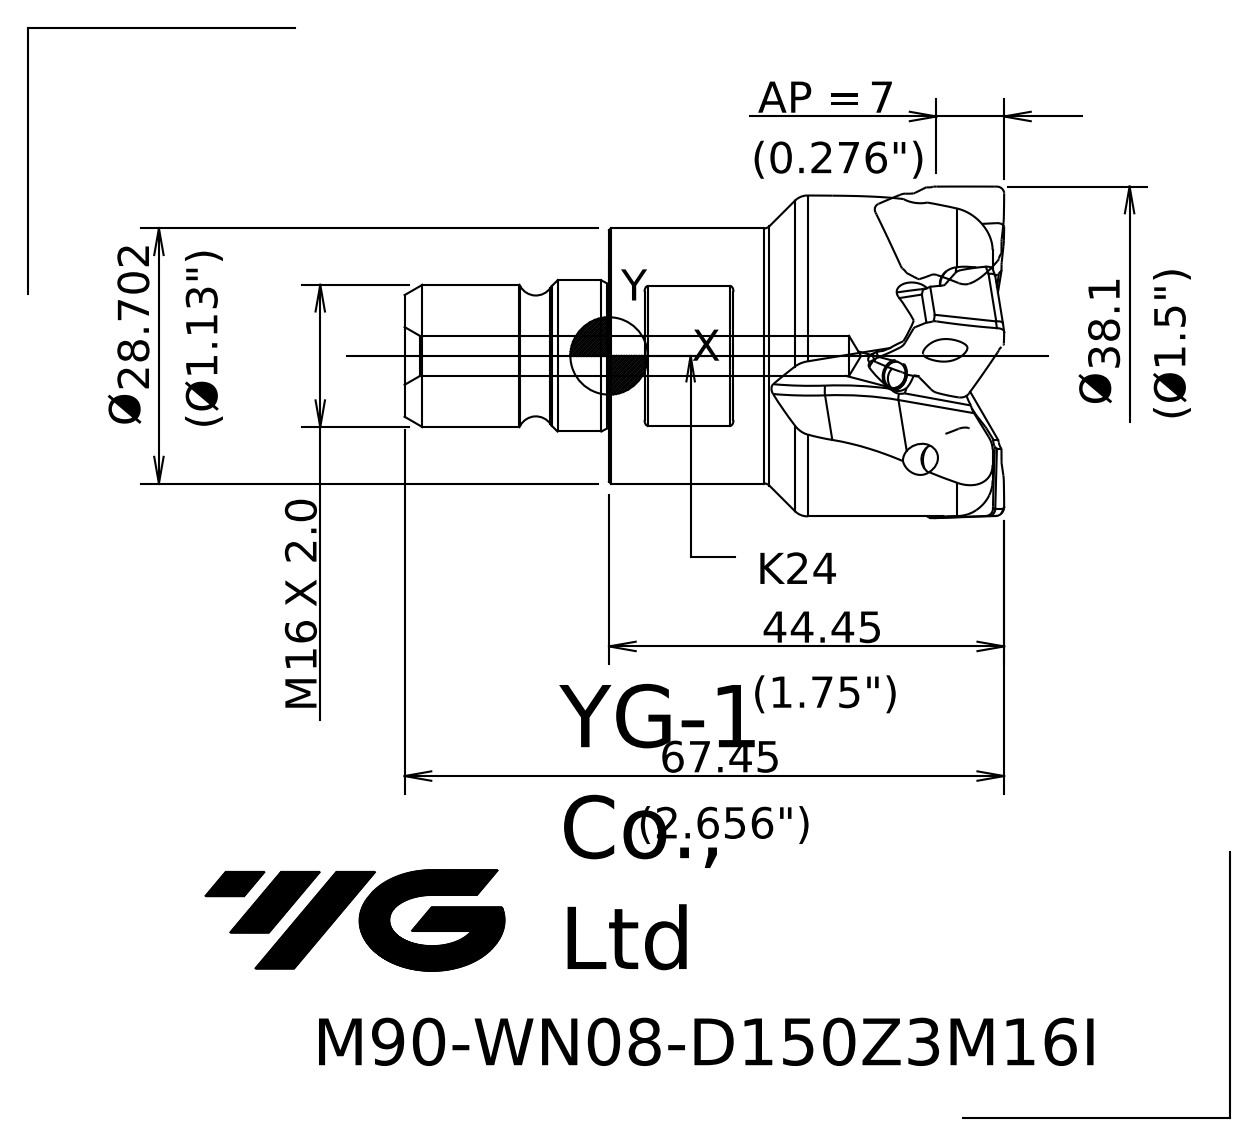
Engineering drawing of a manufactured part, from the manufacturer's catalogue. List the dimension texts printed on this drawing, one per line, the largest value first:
67.45
44.45
38.1 Ø
28.702 Ø
7 AP =
M X 2.0 16
